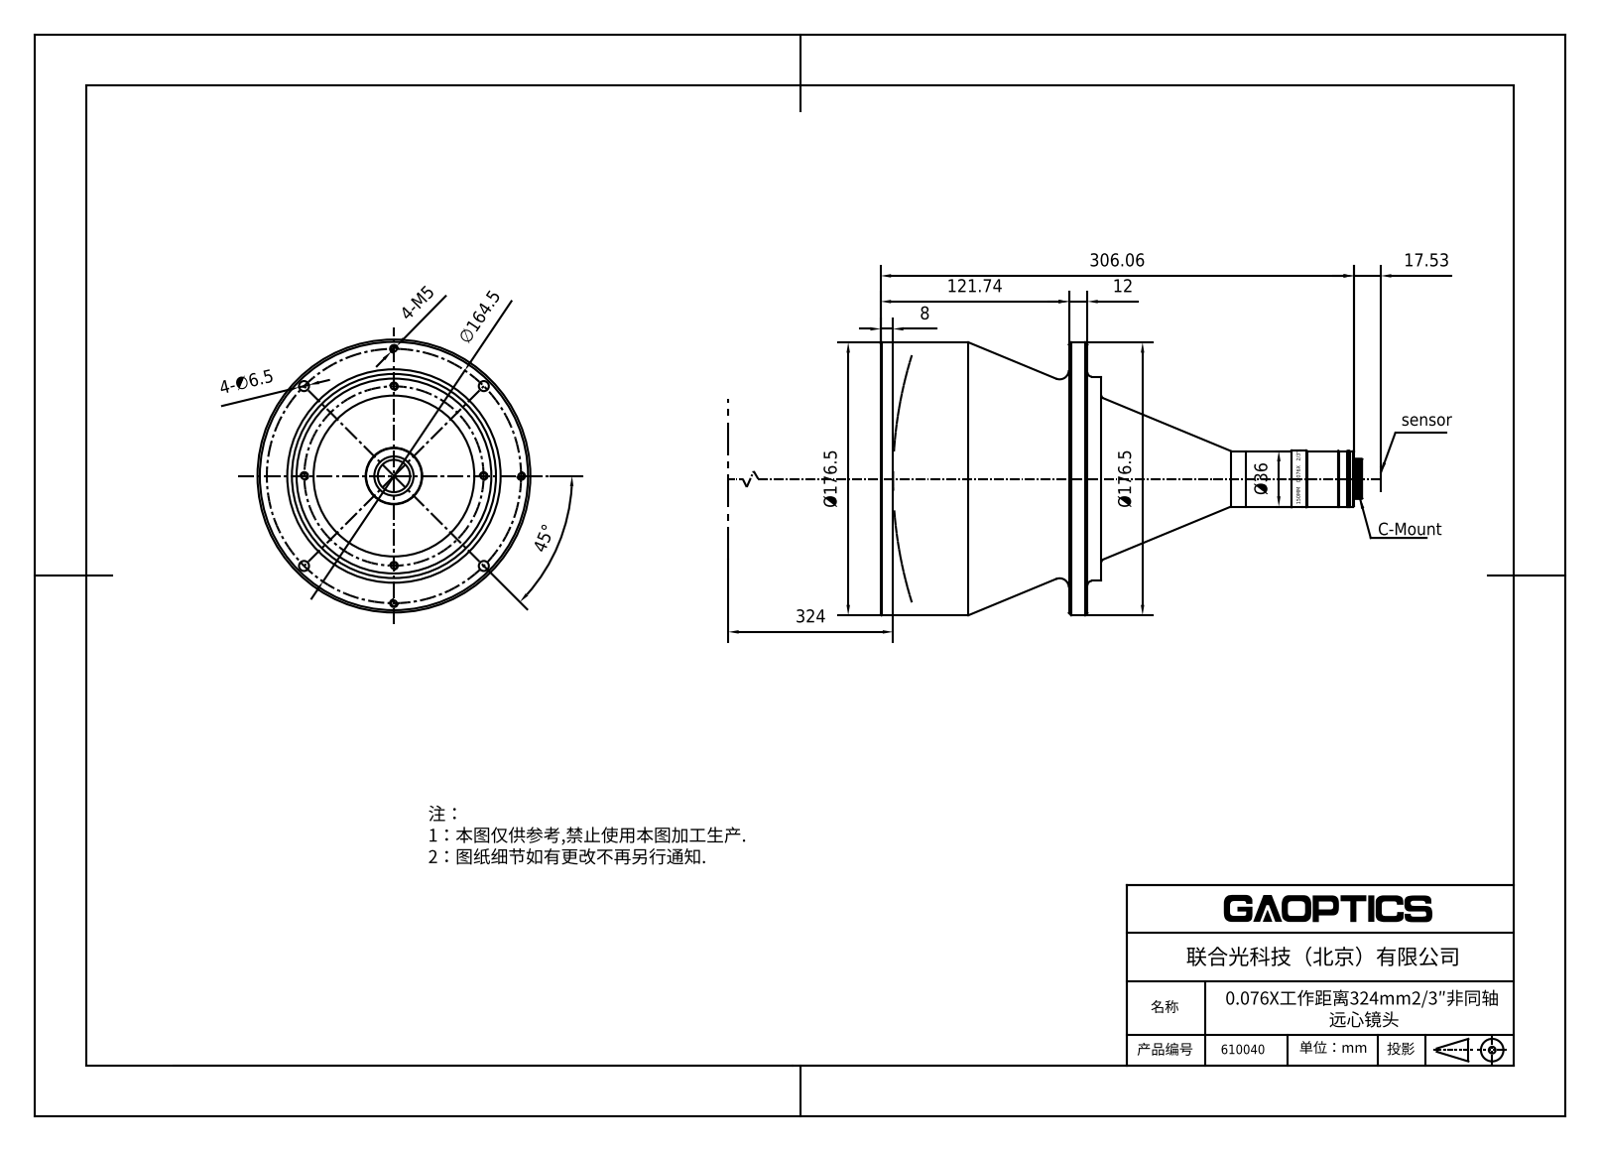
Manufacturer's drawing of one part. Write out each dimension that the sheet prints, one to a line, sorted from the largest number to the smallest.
324
306.06
Ø176.5
Ø176.5
∅164.5
121.74
45°
Ø36
17.53
12
8
4-∅6.5
4-M5
